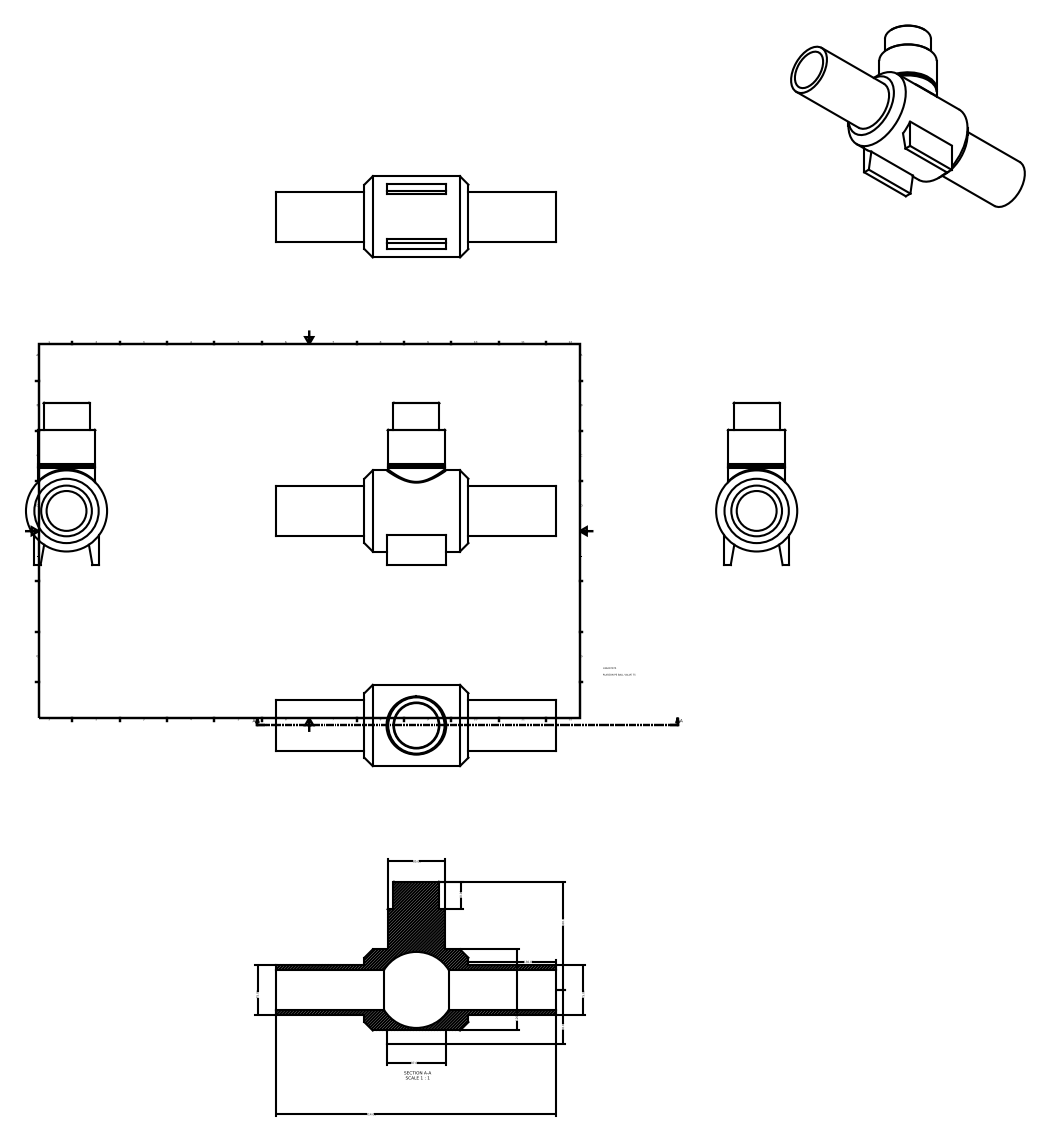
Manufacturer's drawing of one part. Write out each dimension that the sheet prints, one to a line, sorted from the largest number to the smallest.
414.00
160.00
130.00
120.00
87.00
85.00
80.00
75.00
75.00
40.00
